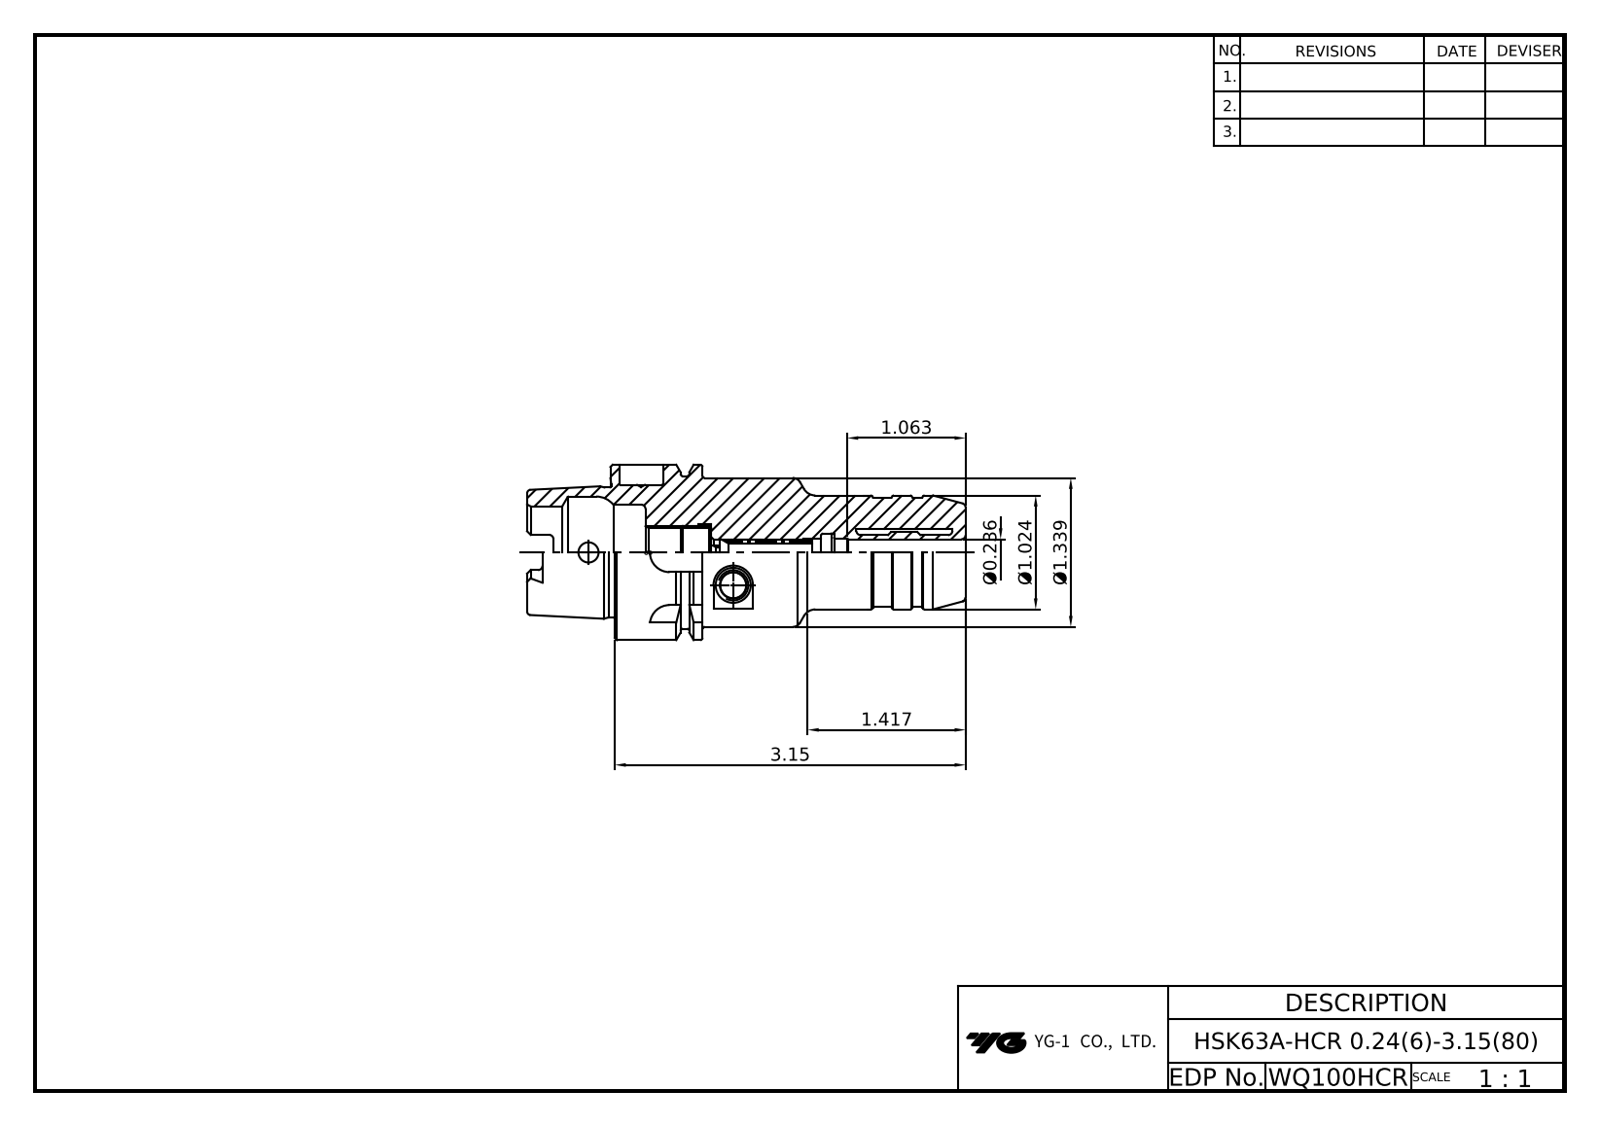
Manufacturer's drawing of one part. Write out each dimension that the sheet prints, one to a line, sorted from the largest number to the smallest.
3.15
1.417
Ø1.339
1.063
Ø1.024
Ø0.236
